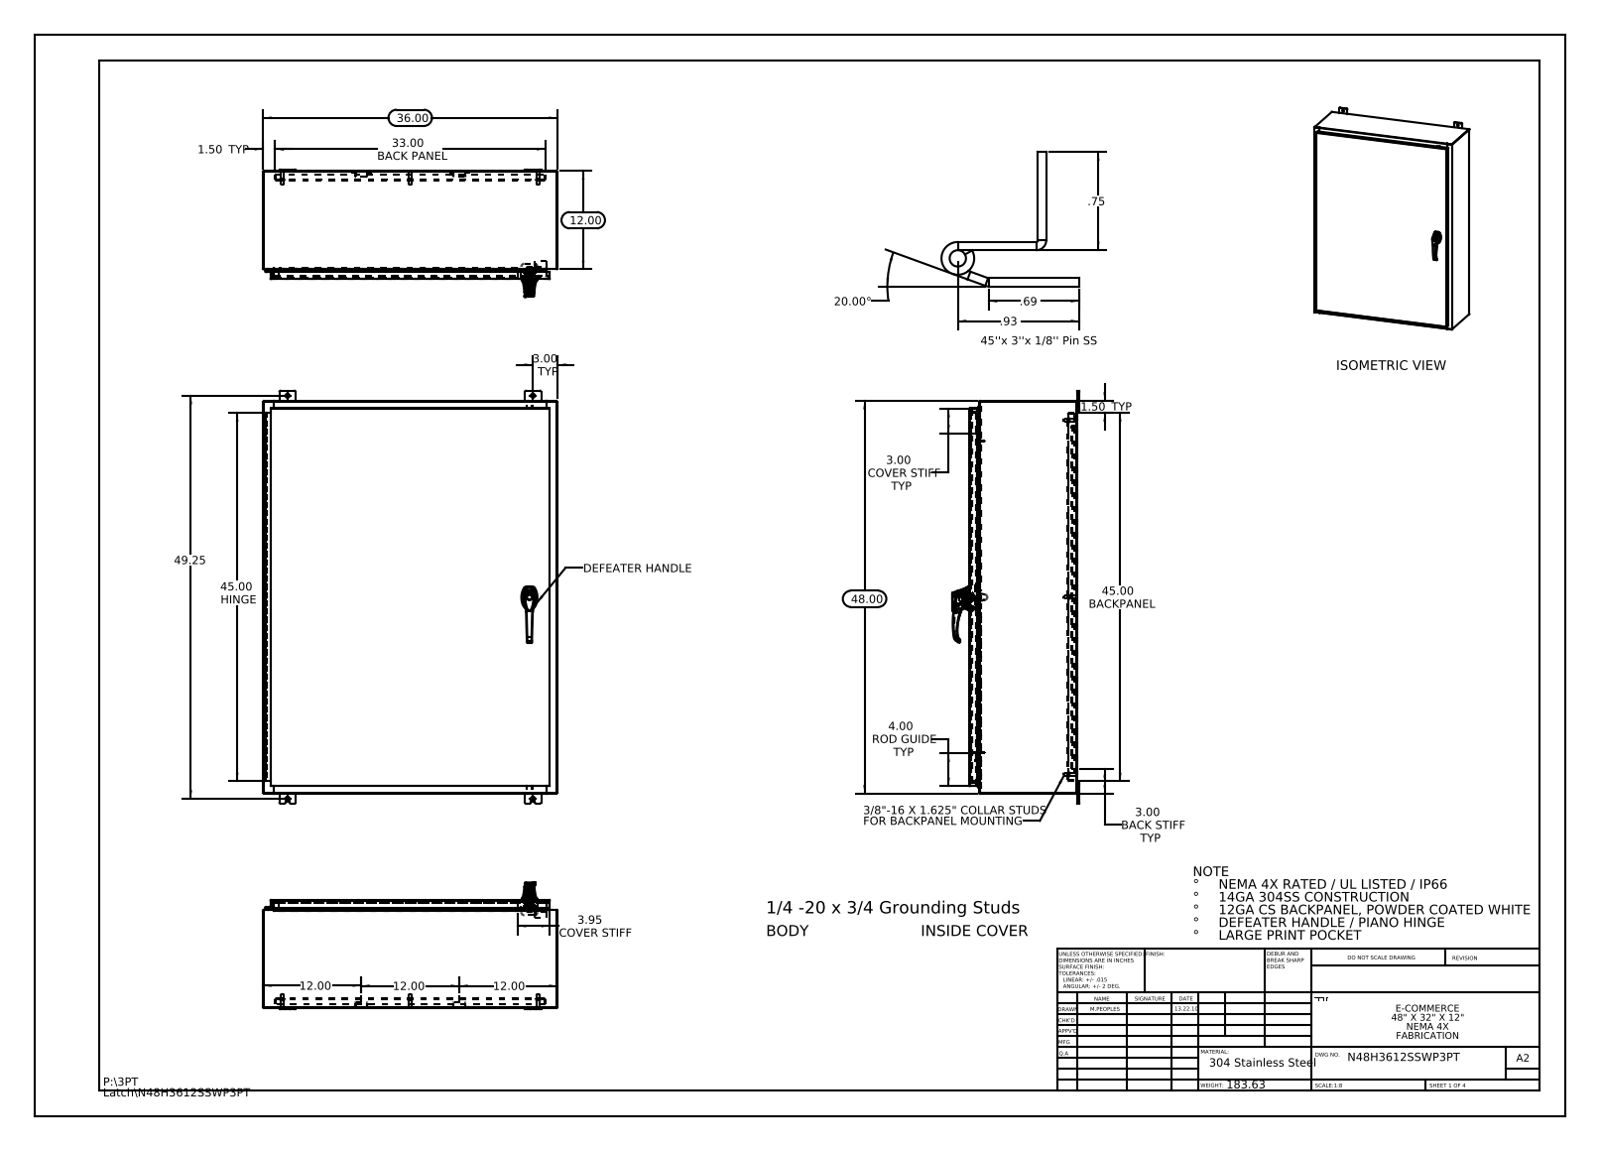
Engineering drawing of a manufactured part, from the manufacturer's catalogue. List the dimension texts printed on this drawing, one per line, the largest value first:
49.25
48.00
45.00 HINGE
45.00 BACKPANEL
36.00
33.00 BACK PANEL
20.00°
12.00
12.00
12.00
12.00
4.00 ROD GUIDE TYP
3.95 COVER STIFF
3.00 TYP
3.00 BACK STIFF TYP
3.00 COVER STIFF TYP
1.50 TYP
1.50 TYP
.93
.75
.69
